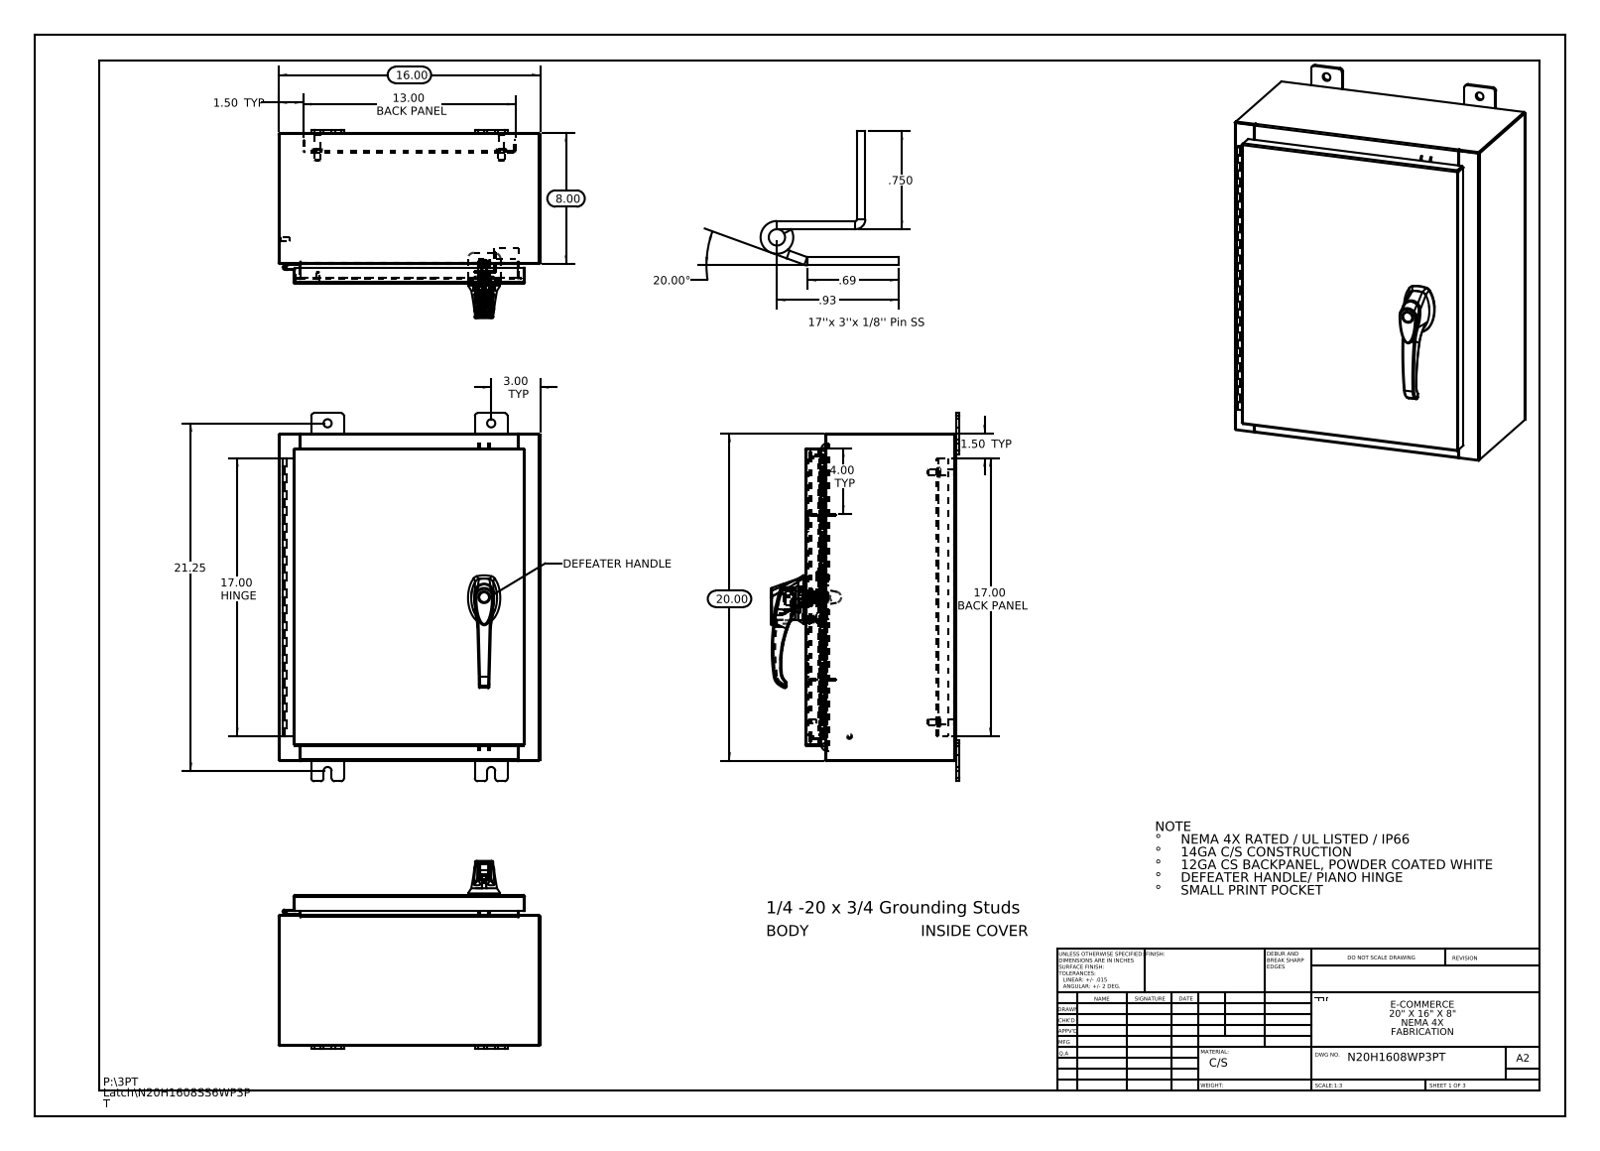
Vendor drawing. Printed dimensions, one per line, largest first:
21.25
20.00
20.00°
17.00 HINGE
17.00 BACK PANEL
16.00
13.00 BACK PANEL
8.00
4.00 TYP
3.00 TYP
1.50 TYP
1.50 TYP
.93
.750
.69
